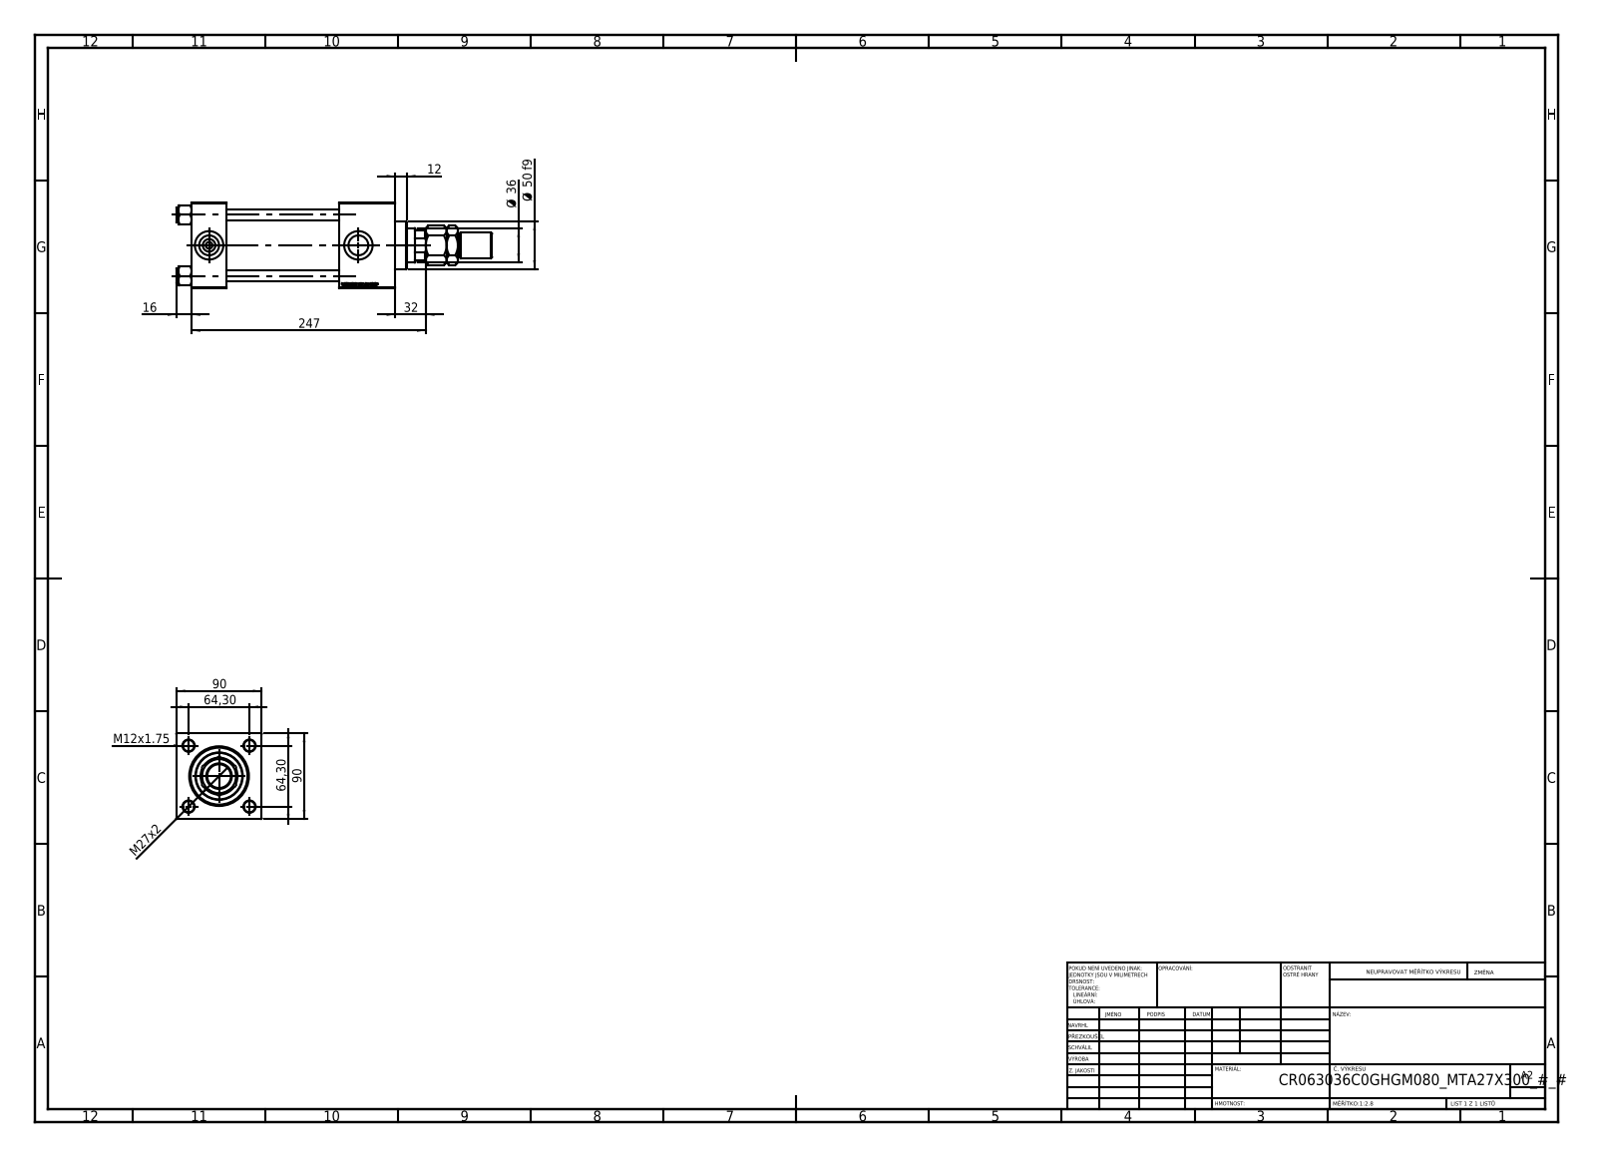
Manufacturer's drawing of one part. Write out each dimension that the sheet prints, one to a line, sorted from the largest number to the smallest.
247
90
90
64,30
64,30
Ø 50 f9
Ø 36
32
M27x2
16
12
M12x1.75
